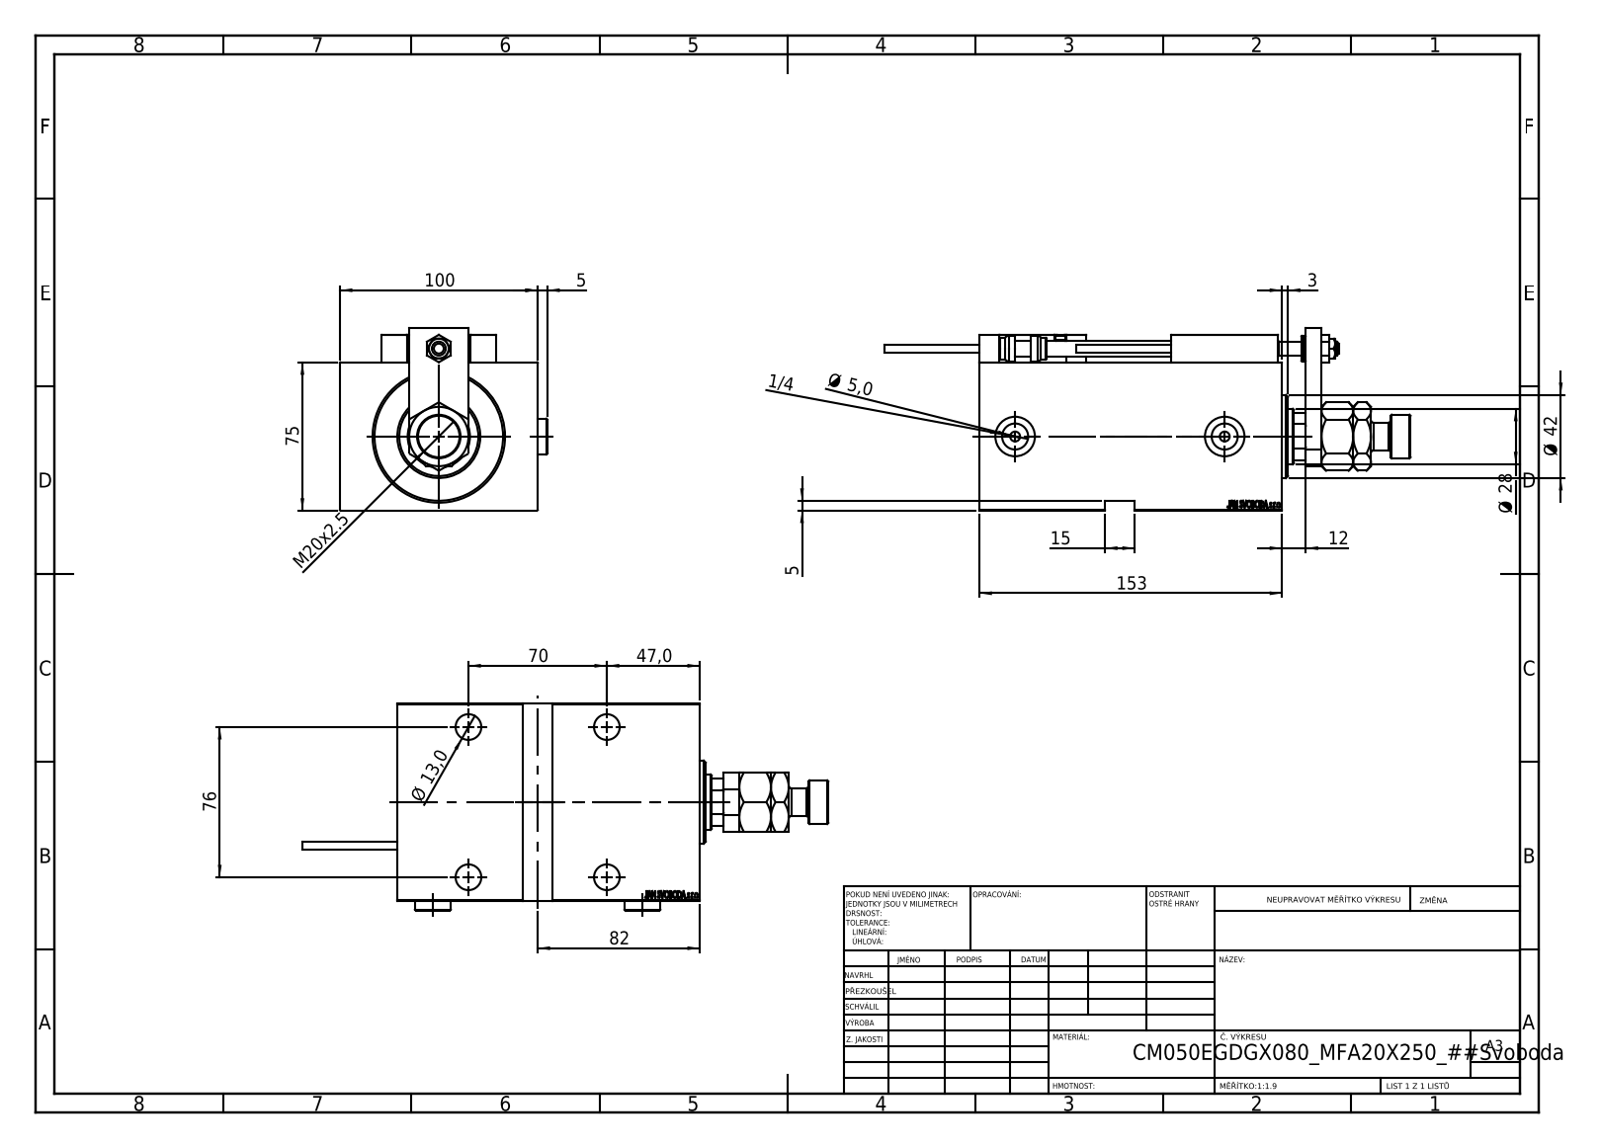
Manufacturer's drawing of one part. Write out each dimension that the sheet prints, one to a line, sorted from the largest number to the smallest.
153
100
82
76
75
70
47,0
Ø 42
Ø 28
M20x2.5
15
Ø 13,0
12
5
Ø 5,0
5
3
1/4
